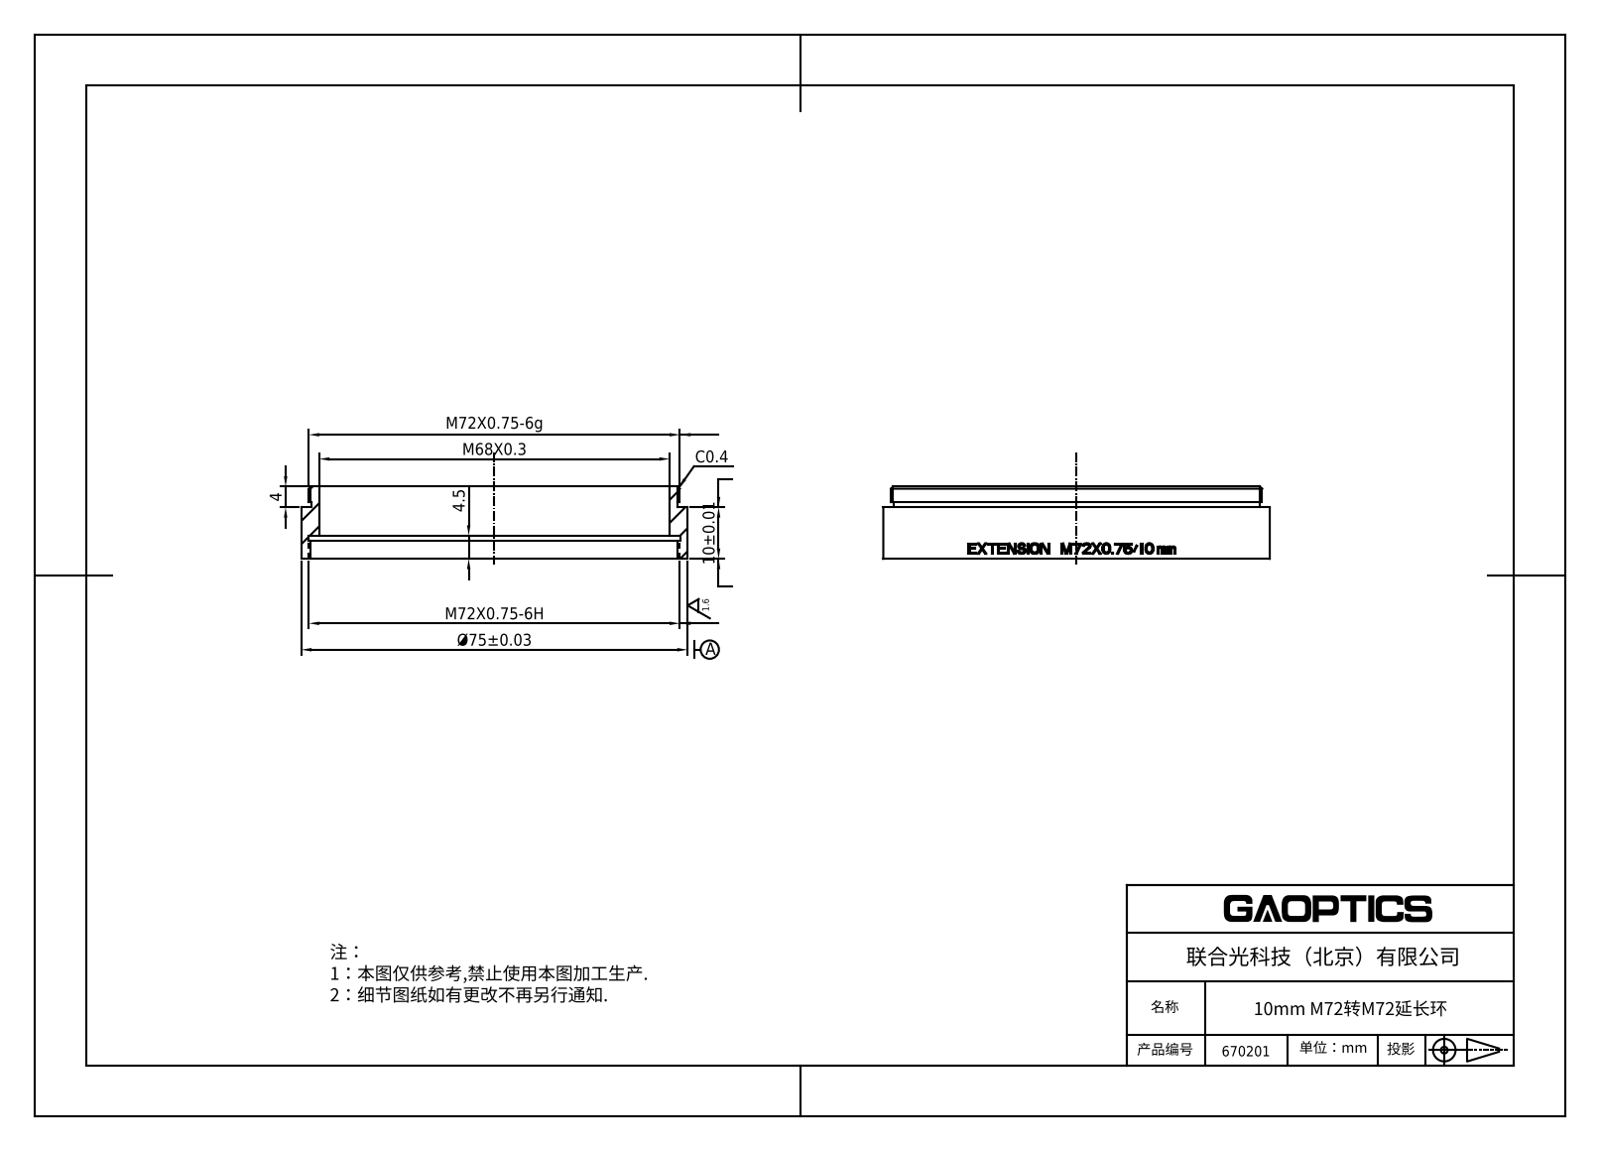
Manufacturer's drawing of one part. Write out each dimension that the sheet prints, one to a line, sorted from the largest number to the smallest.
Ø75±0.03
M72X0.75-6H
M72X0.75-6g
M68X0.3
10±0.01
4.5
4
